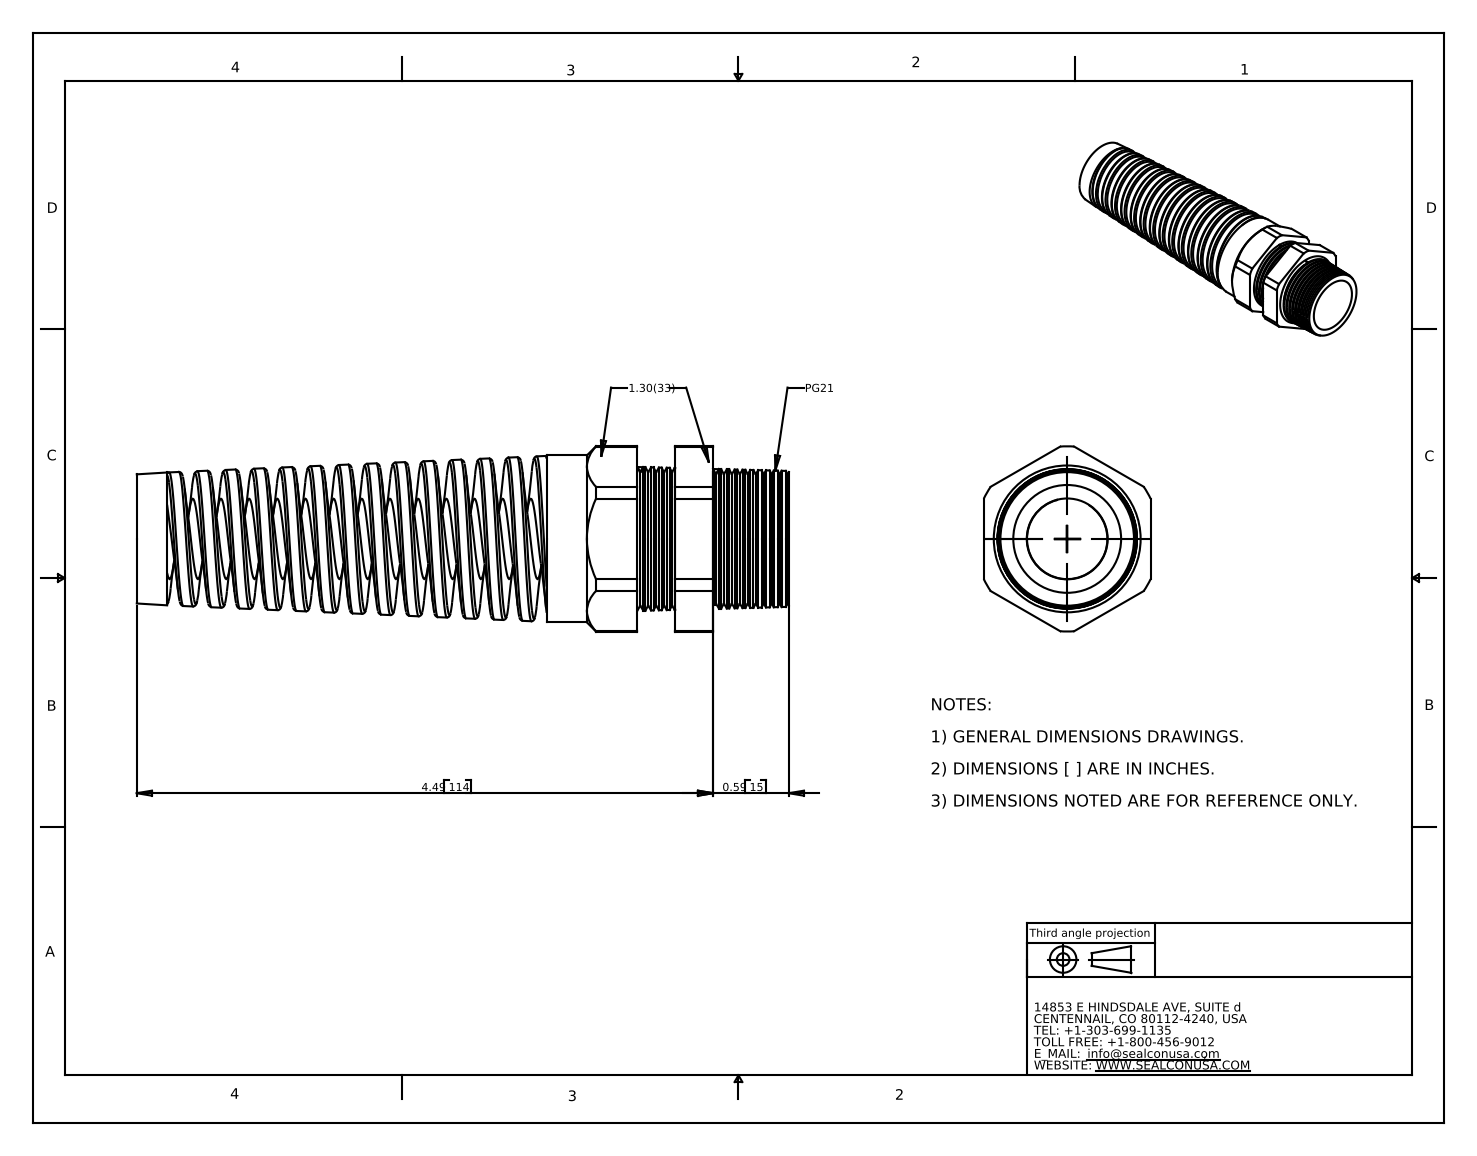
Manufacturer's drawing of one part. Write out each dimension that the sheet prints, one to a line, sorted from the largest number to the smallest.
4.49 114
0.59 15
